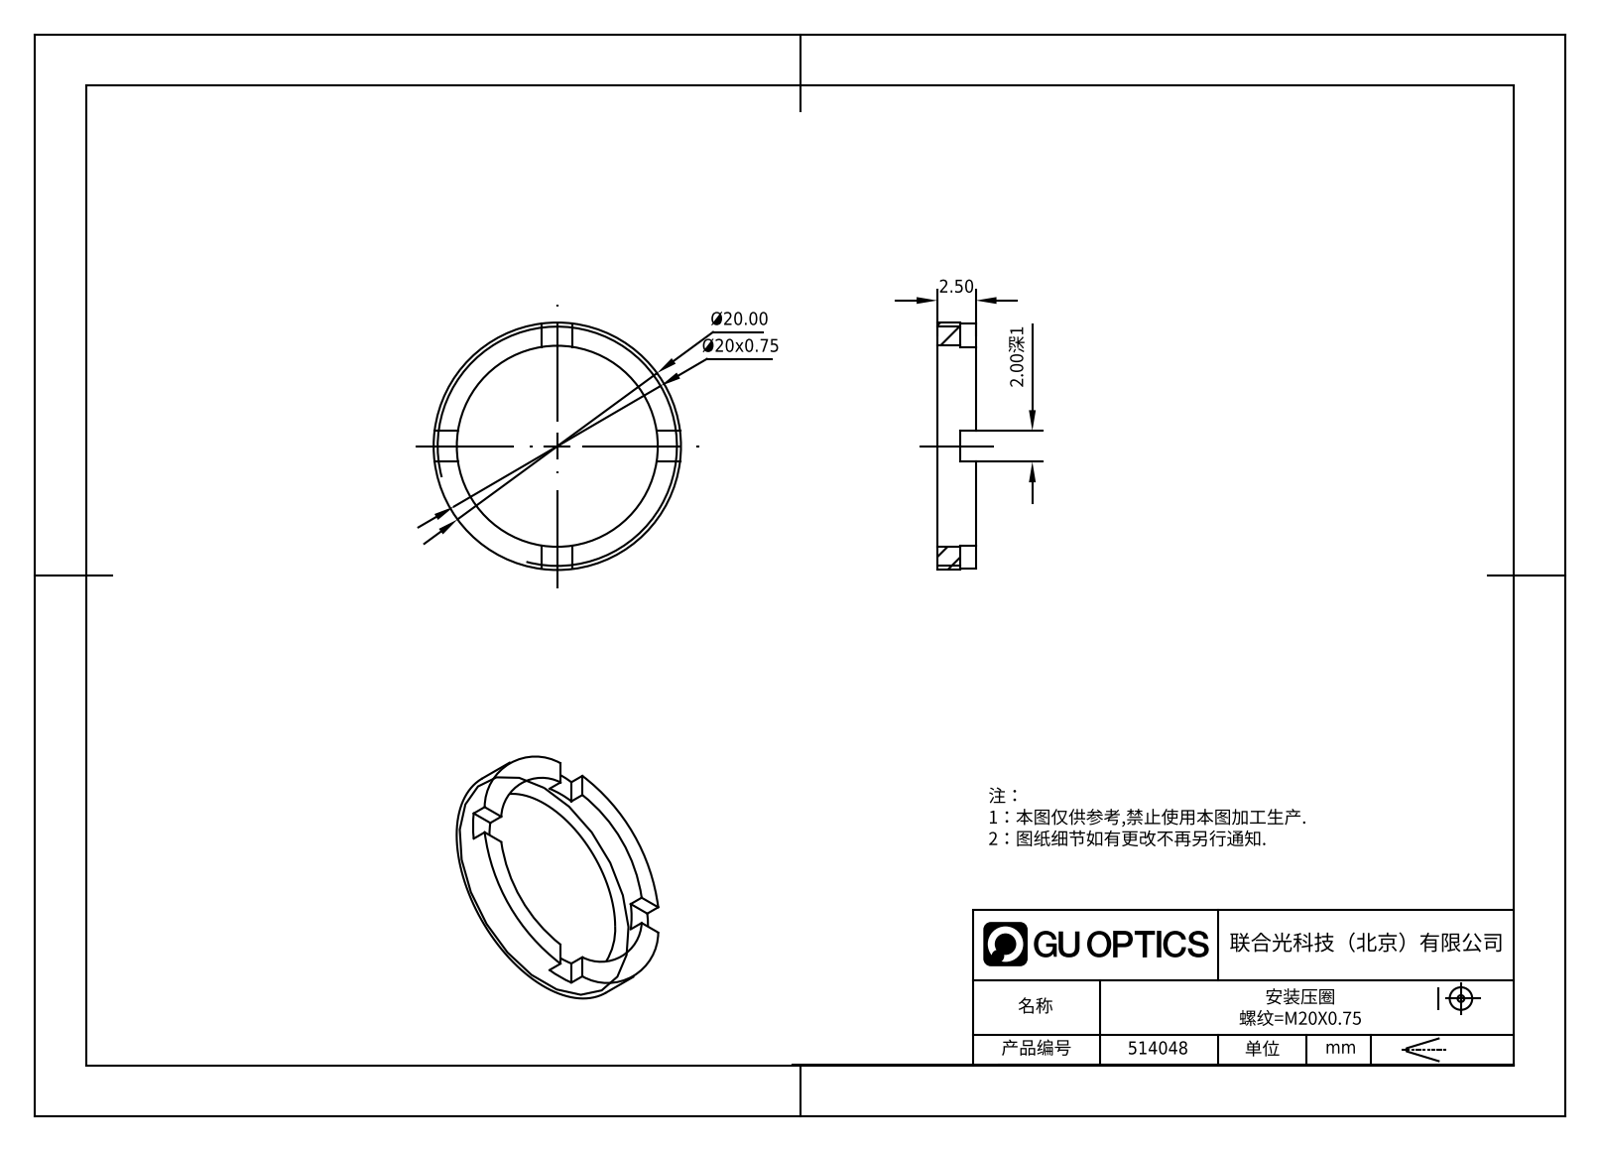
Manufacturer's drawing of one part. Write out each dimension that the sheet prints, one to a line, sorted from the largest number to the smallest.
Ø20.00
Ø20x0.75
2.50
2.00深1
